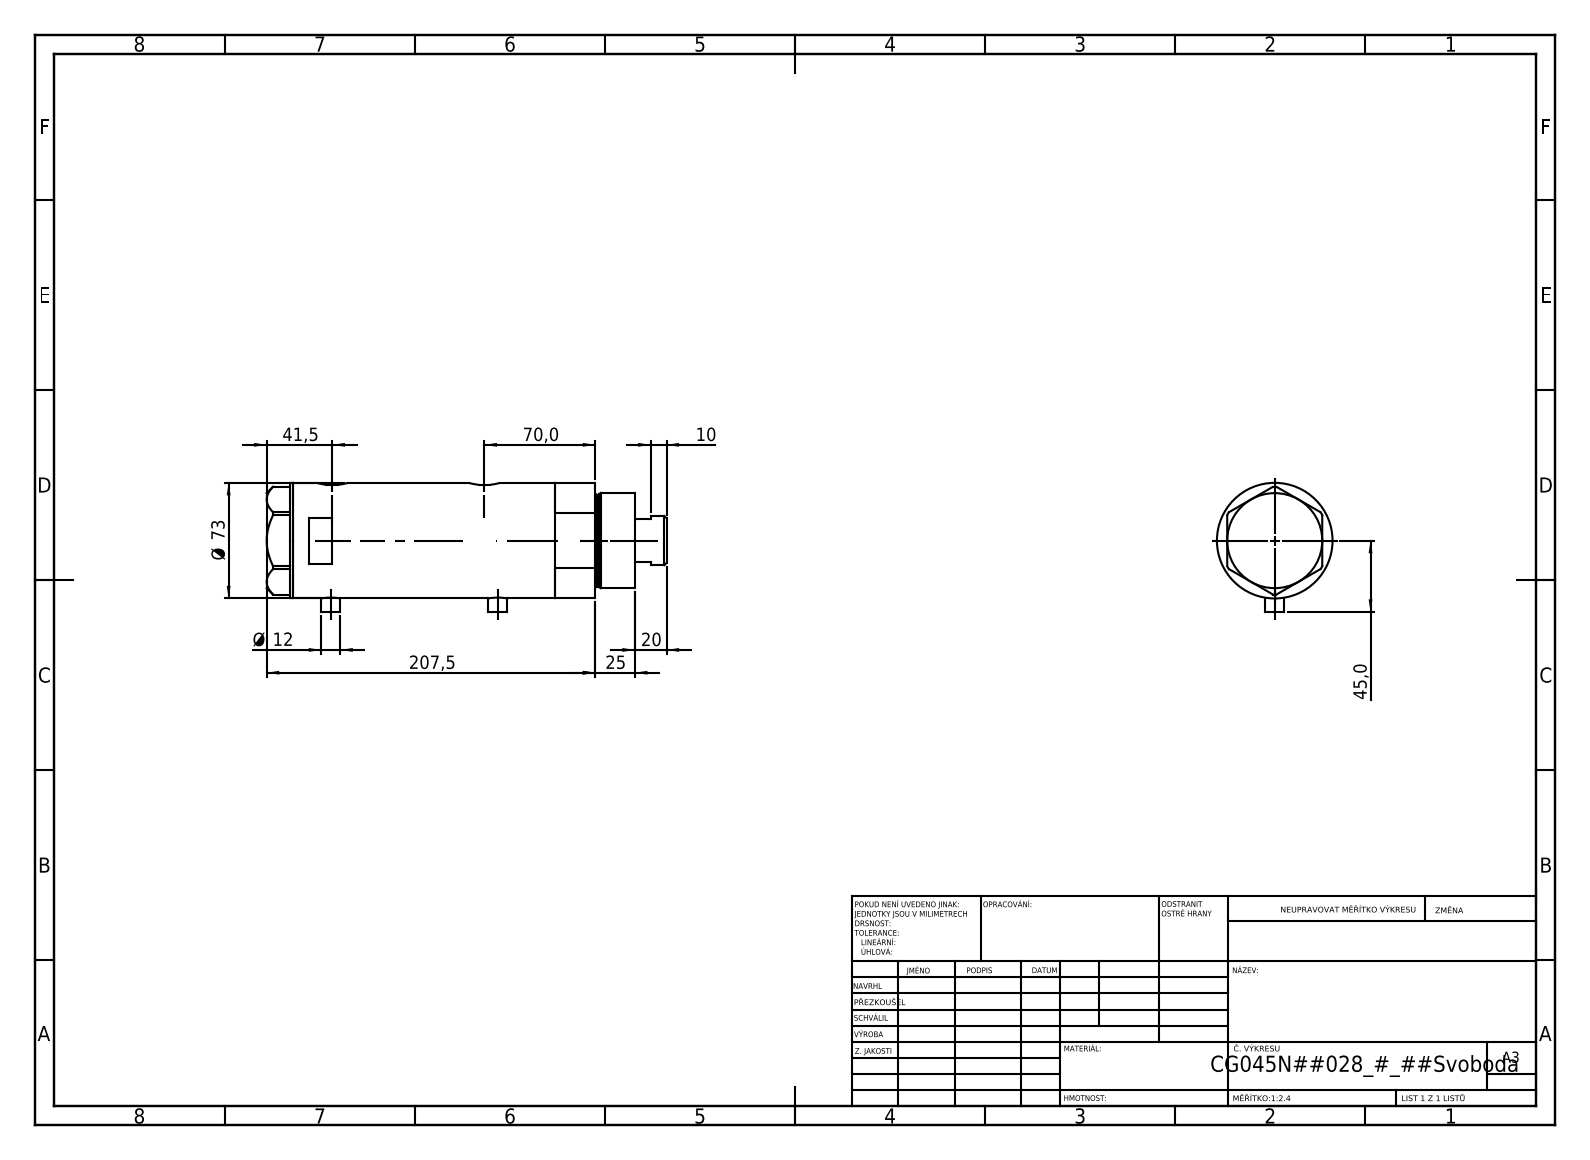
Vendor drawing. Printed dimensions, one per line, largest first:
207,5
Ø 73
70,0
45,0
41,5
25
20
Ø 12
10
